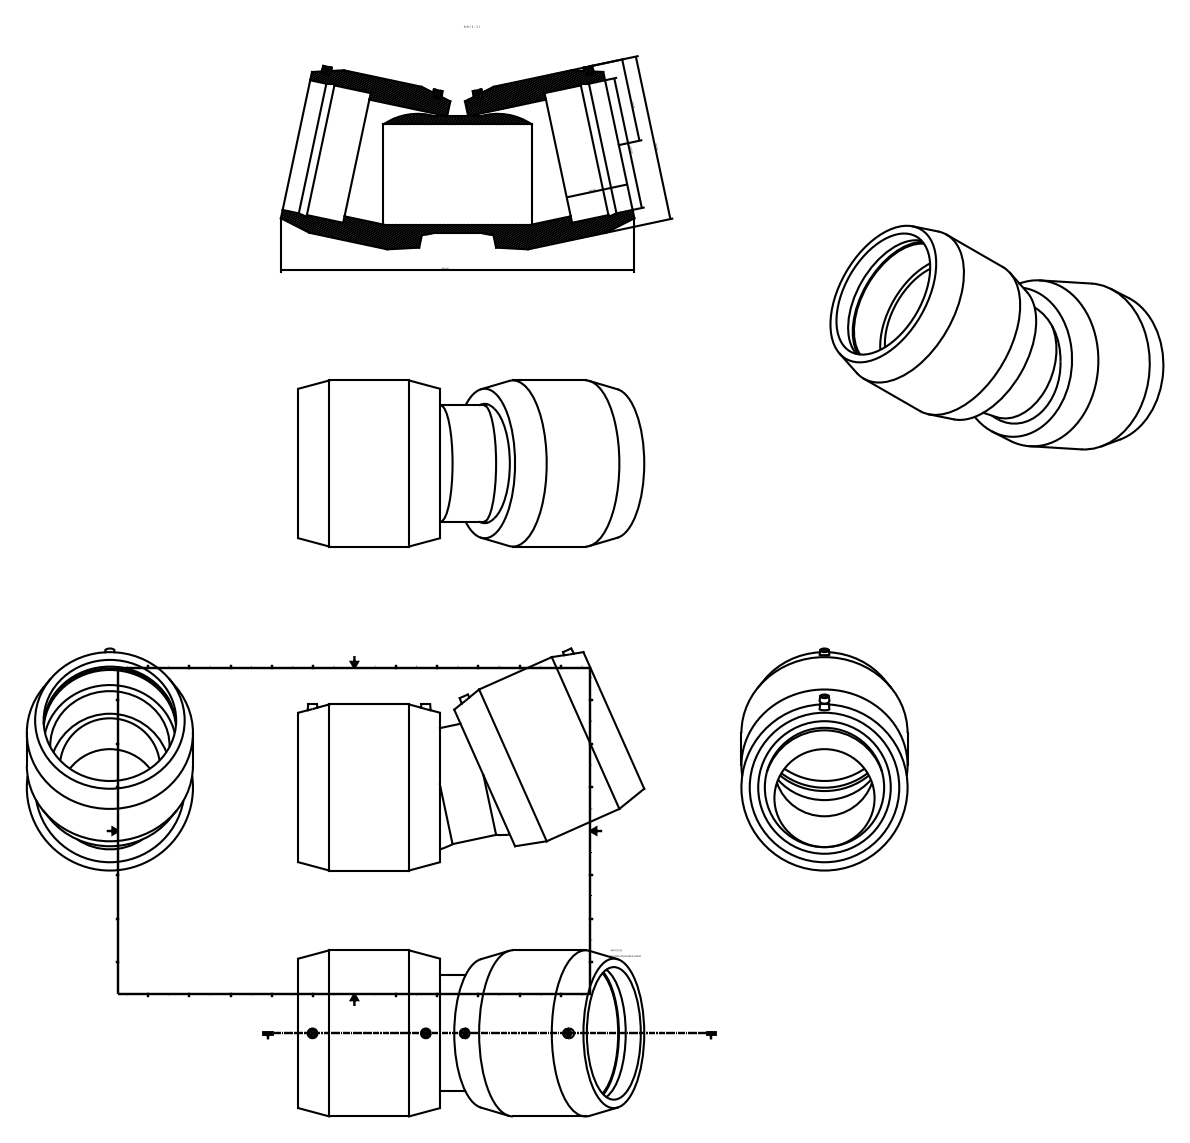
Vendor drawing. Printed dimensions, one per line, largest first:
600,00
282,00
n225,00
141,00
105,00
